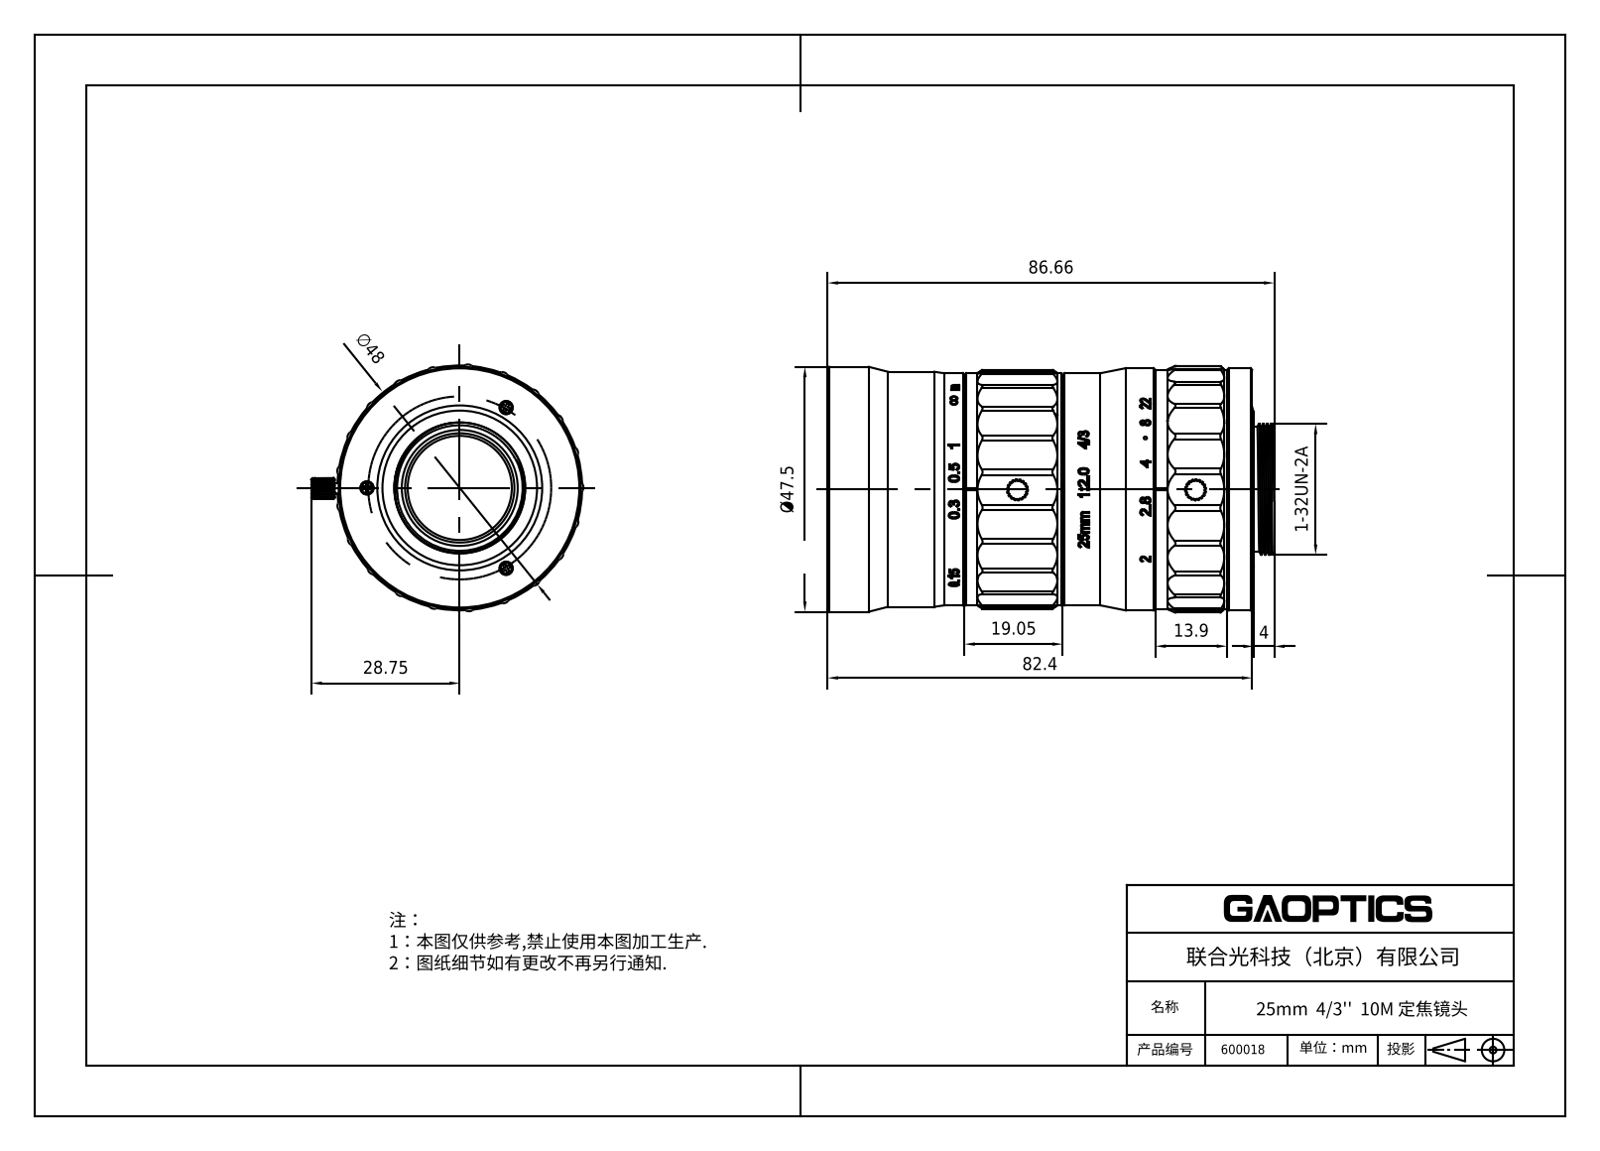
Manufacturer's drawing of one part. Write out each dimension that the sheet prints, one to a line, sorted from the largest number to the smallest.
86.66
82.4
∅48
Ø47.5
28.75
19.05
13.9
4
1-32UN-2A
